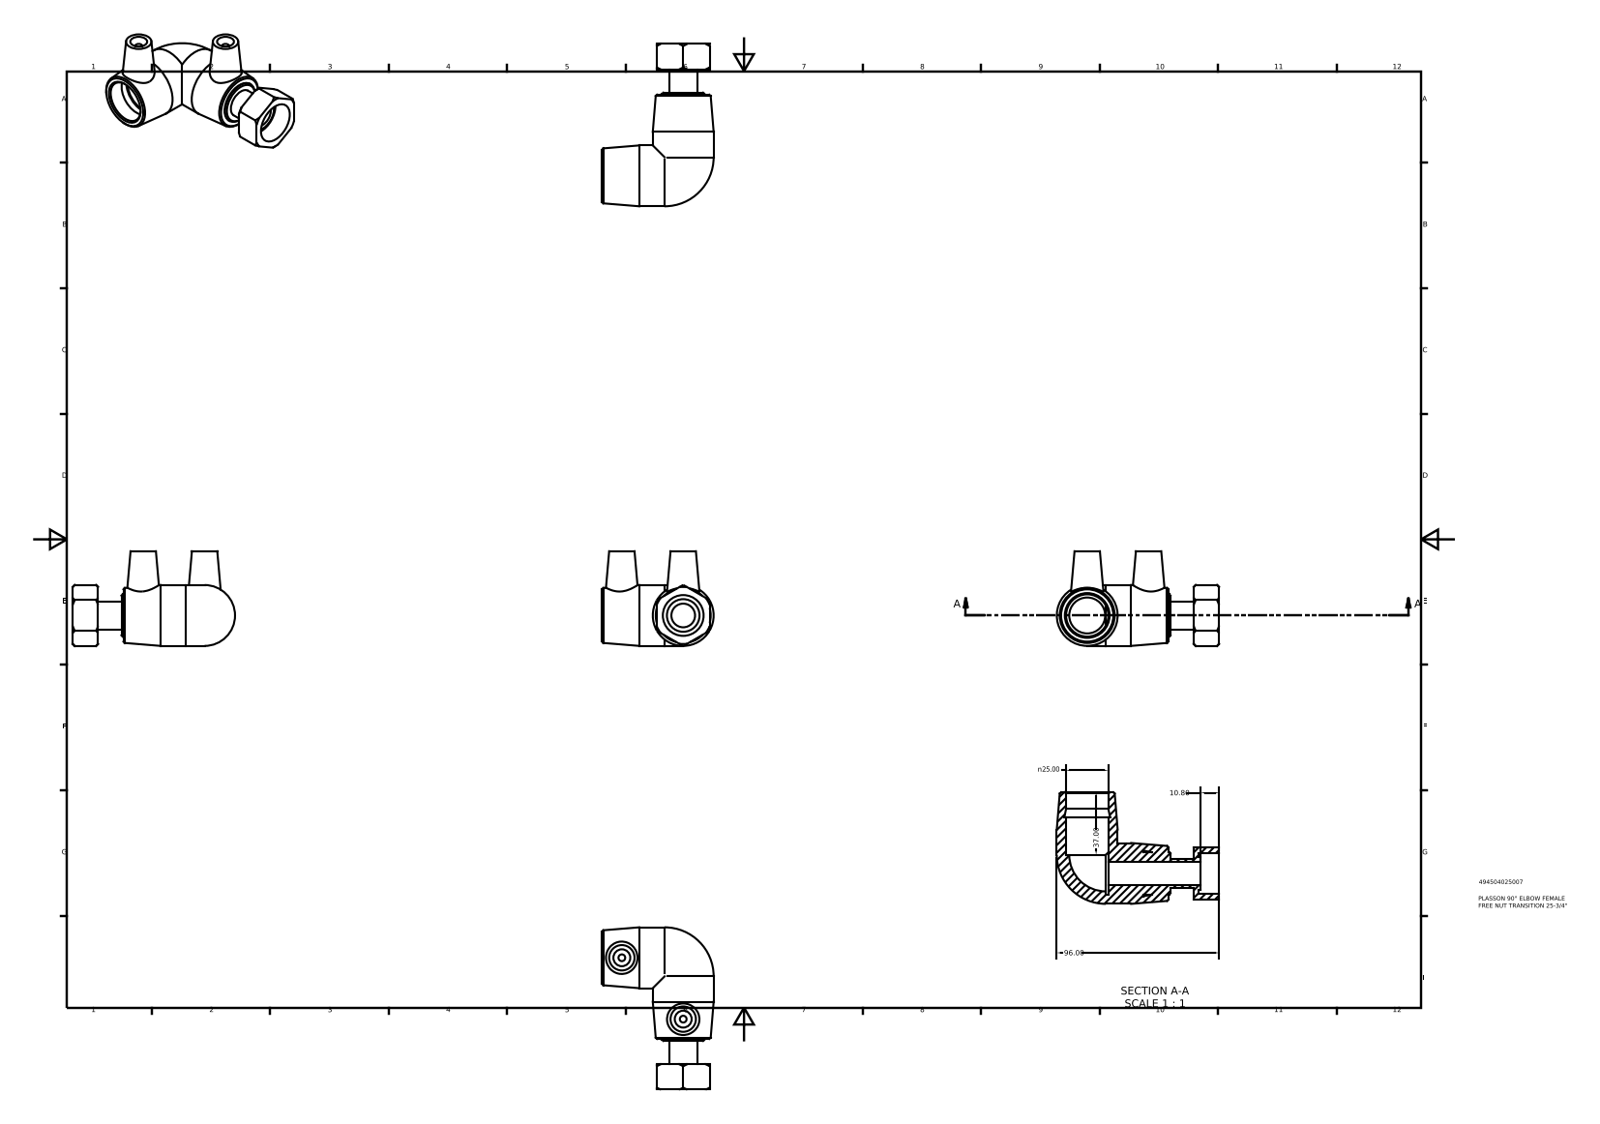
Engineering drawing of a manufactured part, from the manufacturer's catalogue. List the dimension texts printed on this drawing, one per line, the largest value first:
96.00
37.00
n25.00
10.80
